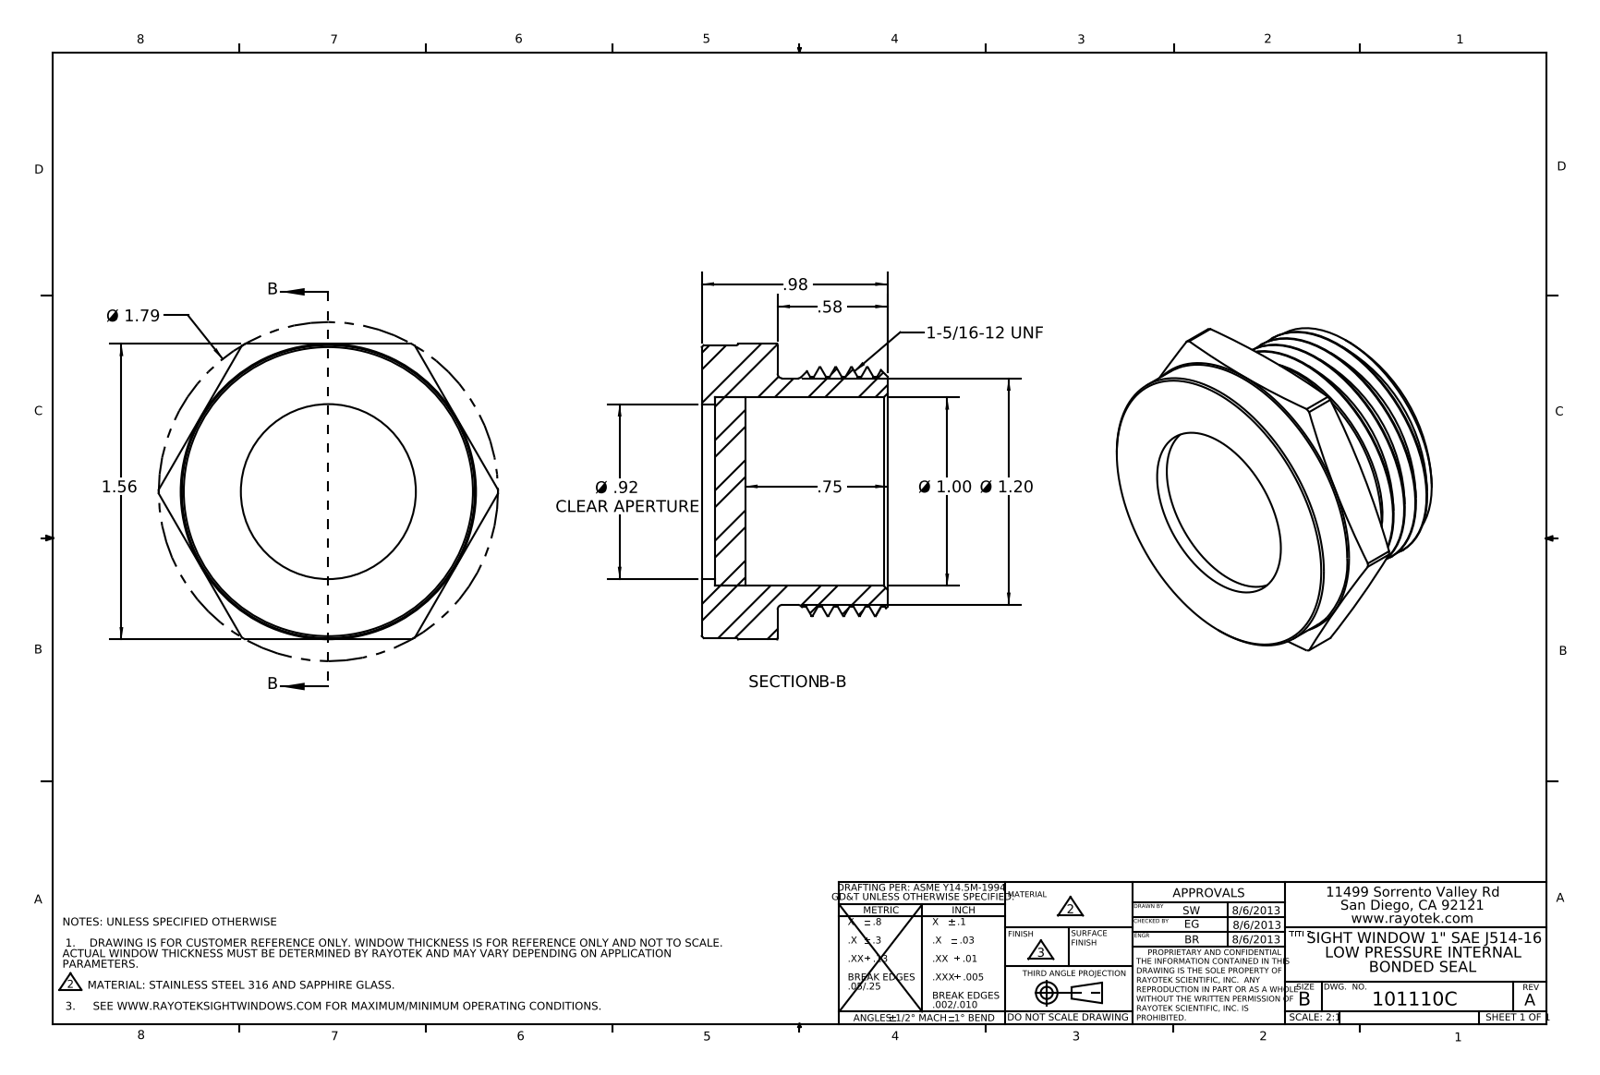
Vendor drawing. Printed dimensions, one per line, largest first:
Ø 1.79
1.56
Ø 1.20
Ø 1.00
.98
Ø .92 CLEAR APERTURE
.75
.58
